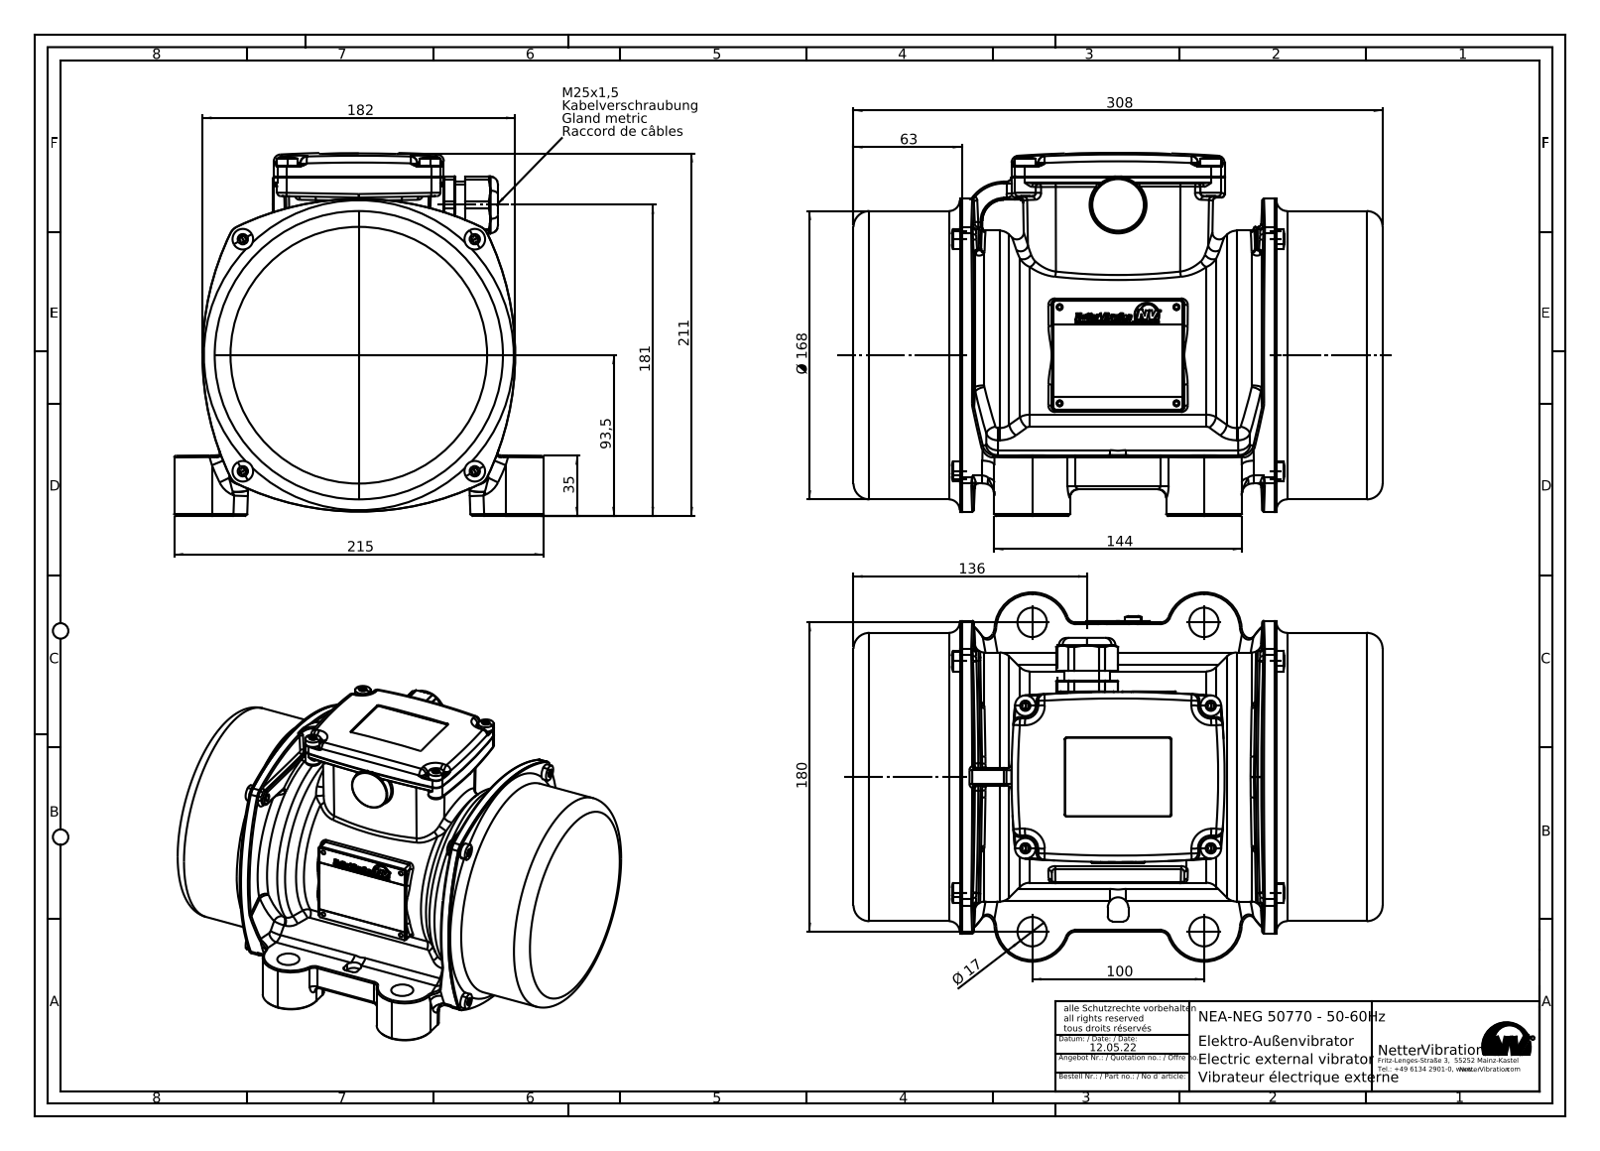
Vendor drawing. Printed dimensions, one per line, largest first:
308
215
211
182
181
180
Ø 168
144
136
100
93,5
63
35
Ø 17
